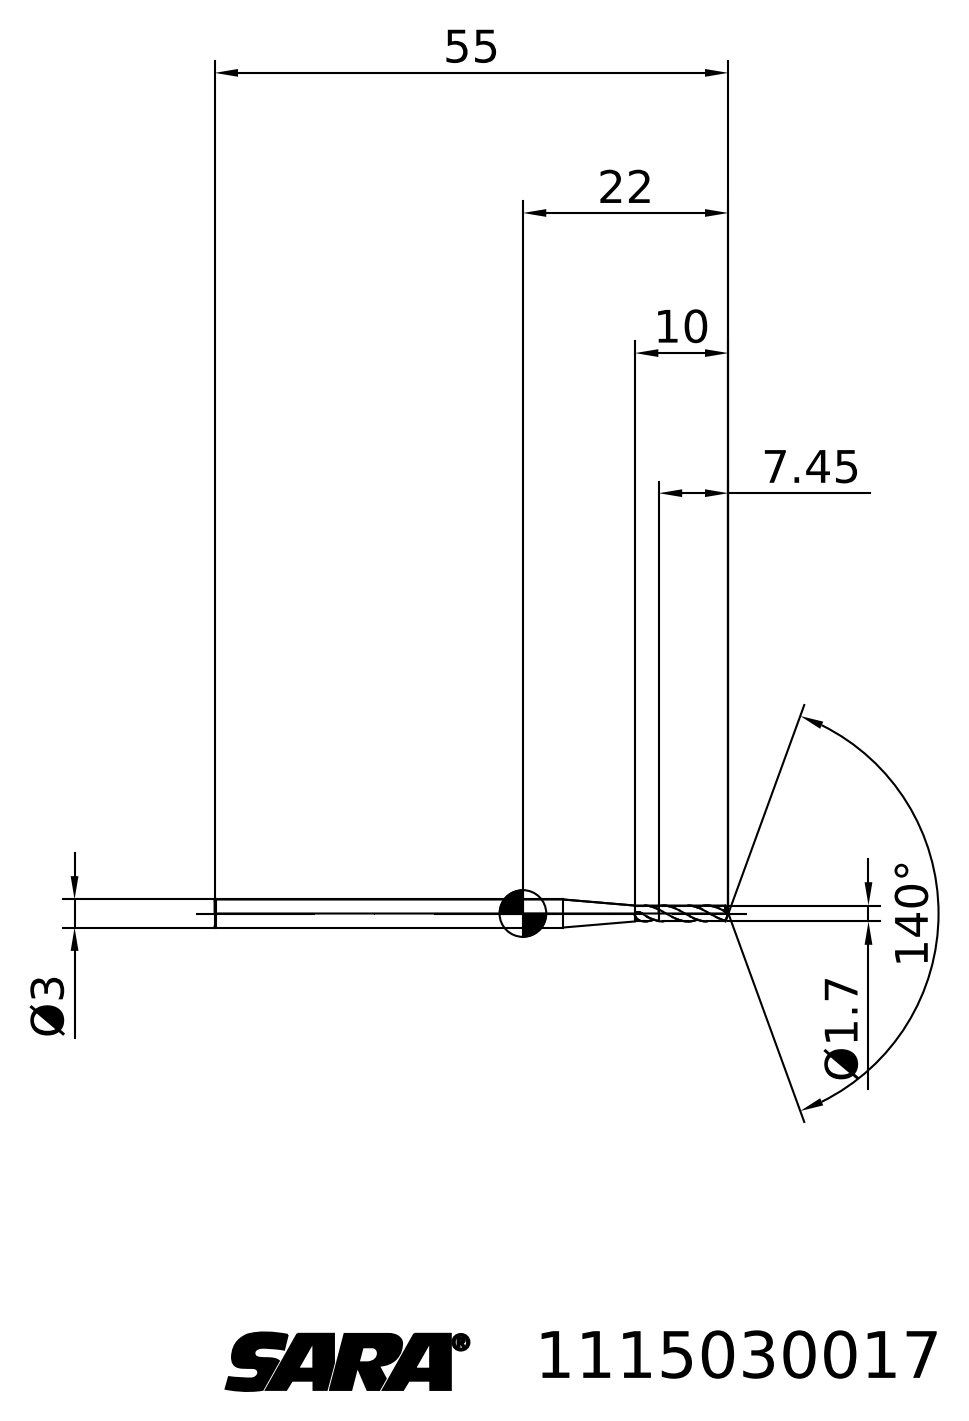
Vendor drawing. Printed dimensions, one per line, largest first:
140°
55
22
10
7.45
Ø3
Ø1.7
